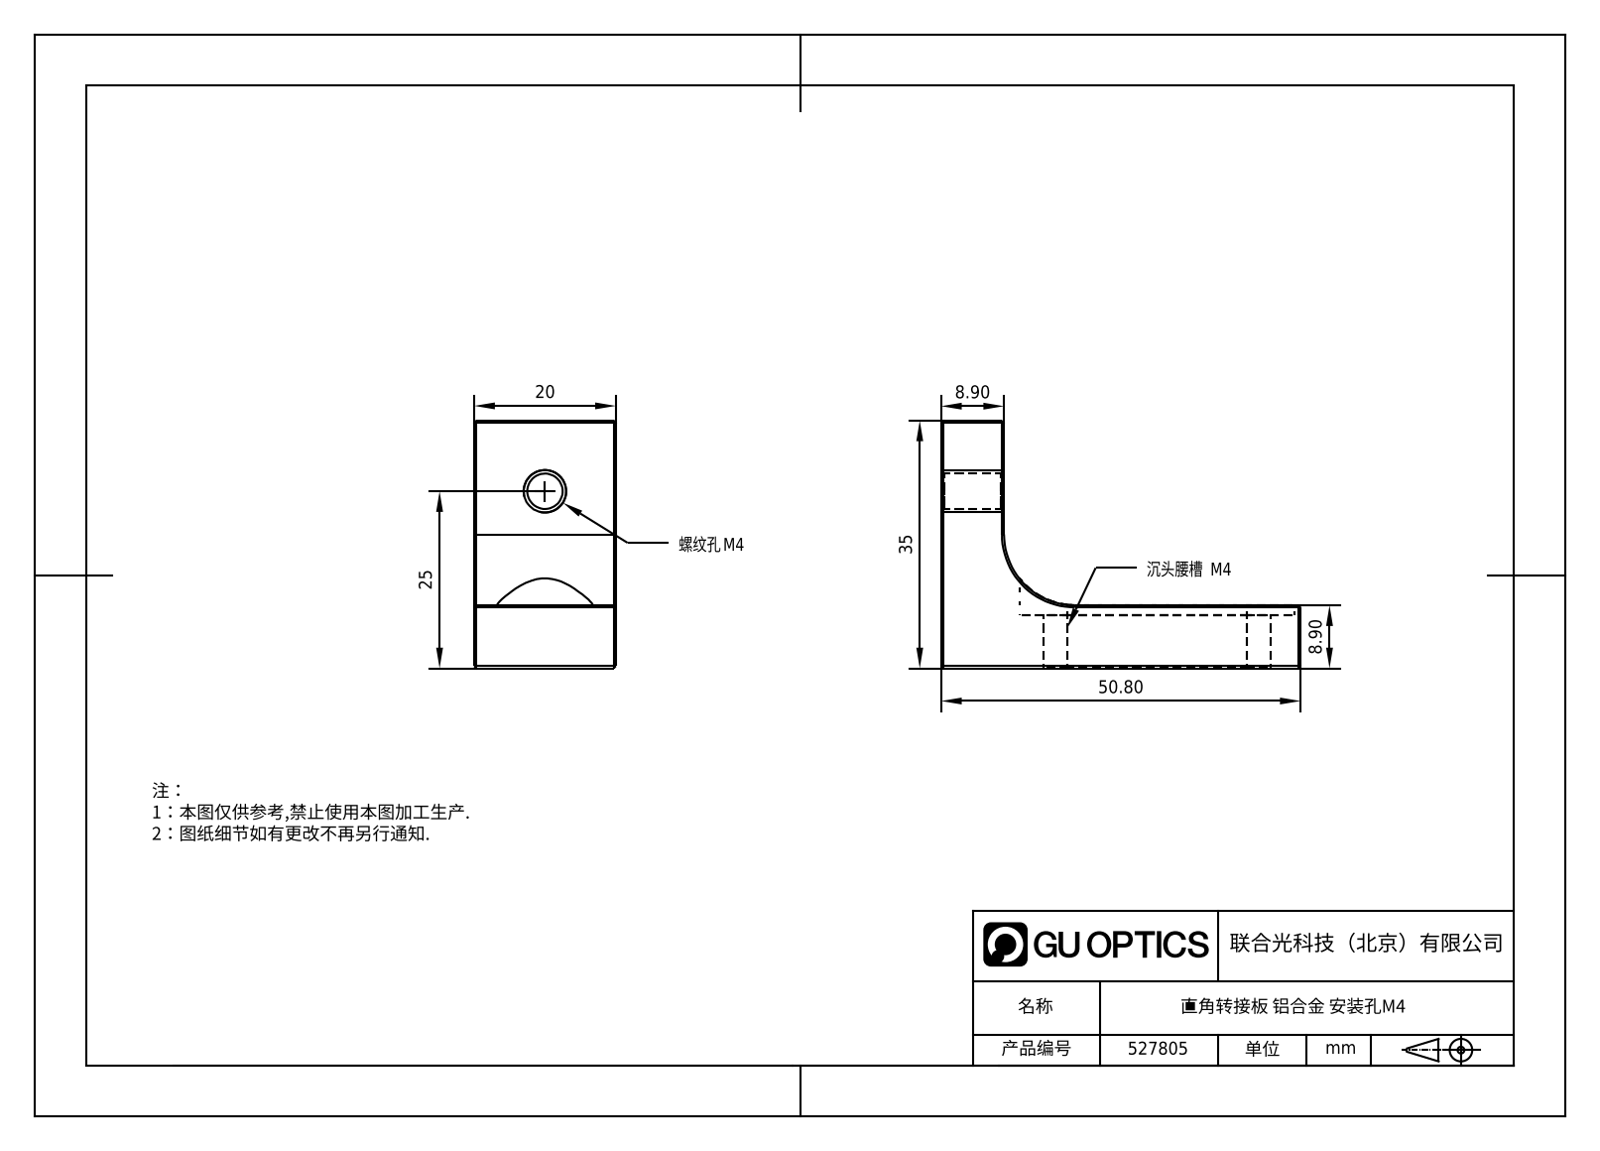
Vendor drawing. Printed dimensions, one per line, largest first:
50.80
35
25
20
8.90
8.90
